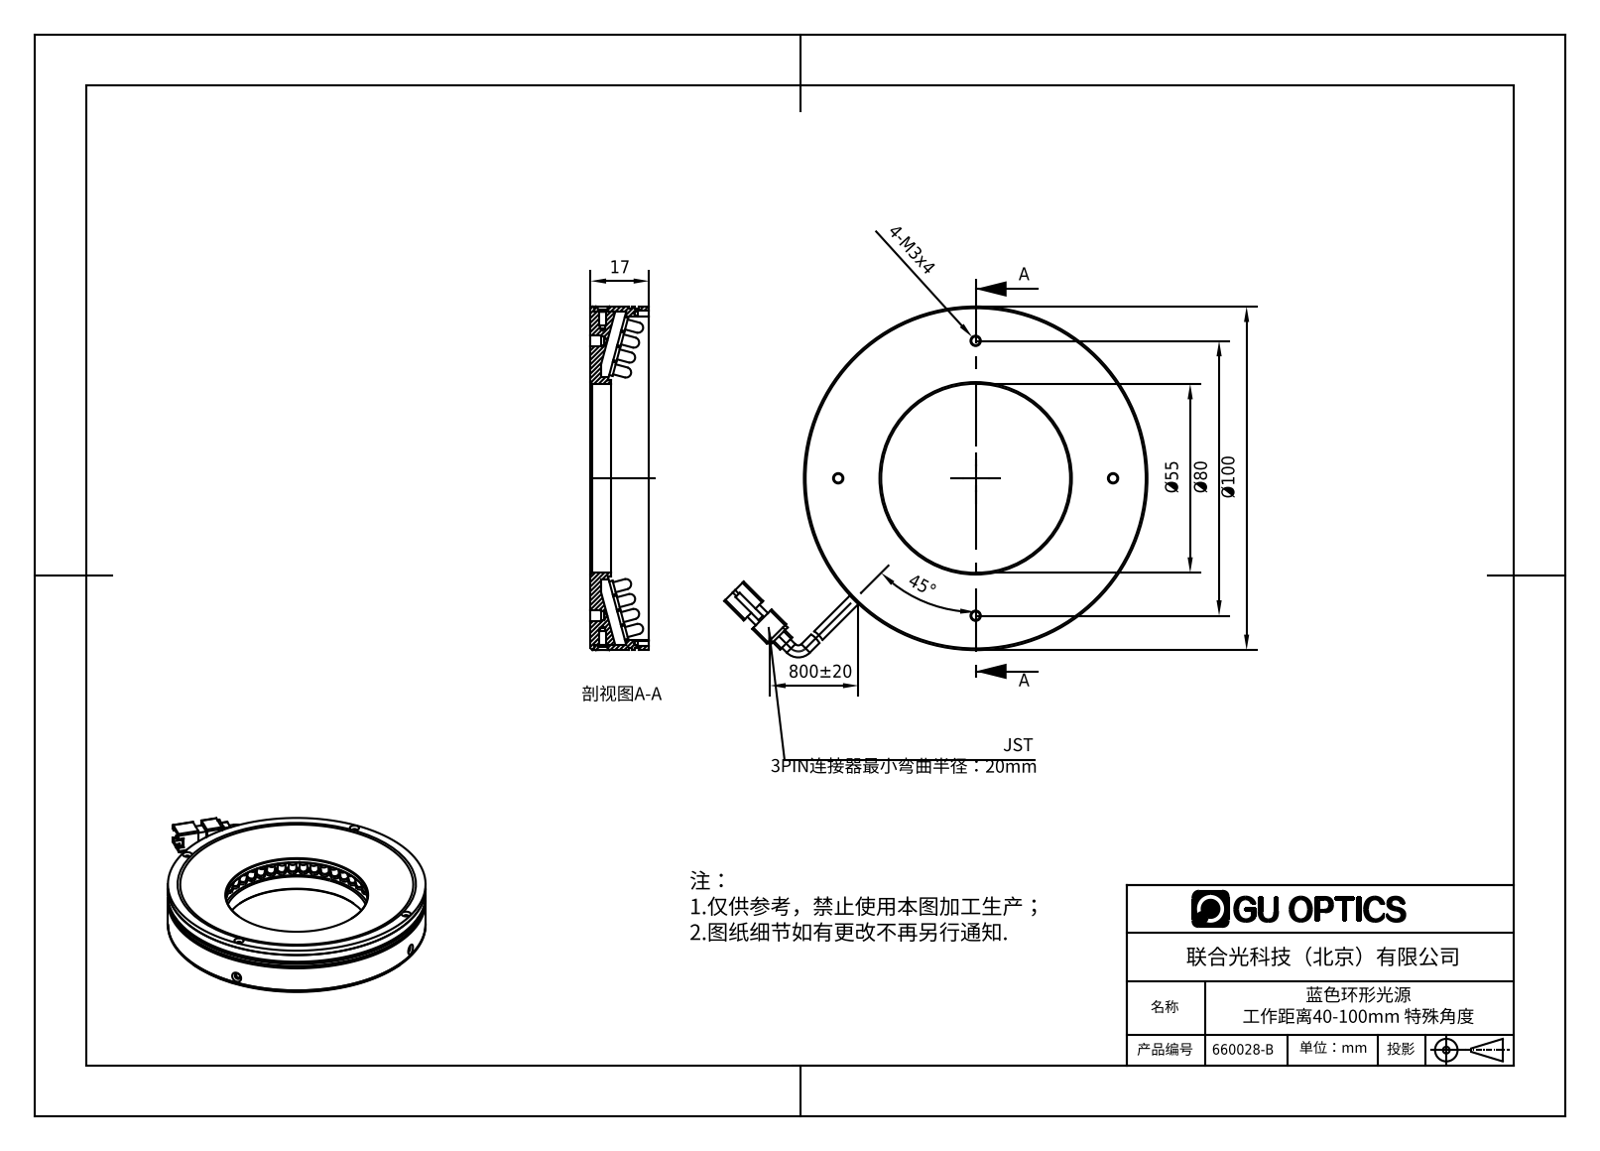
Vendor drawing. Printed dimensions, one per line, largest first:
800±20
Ø100
Ø80
Ø55
45°
17
4-M3x4
